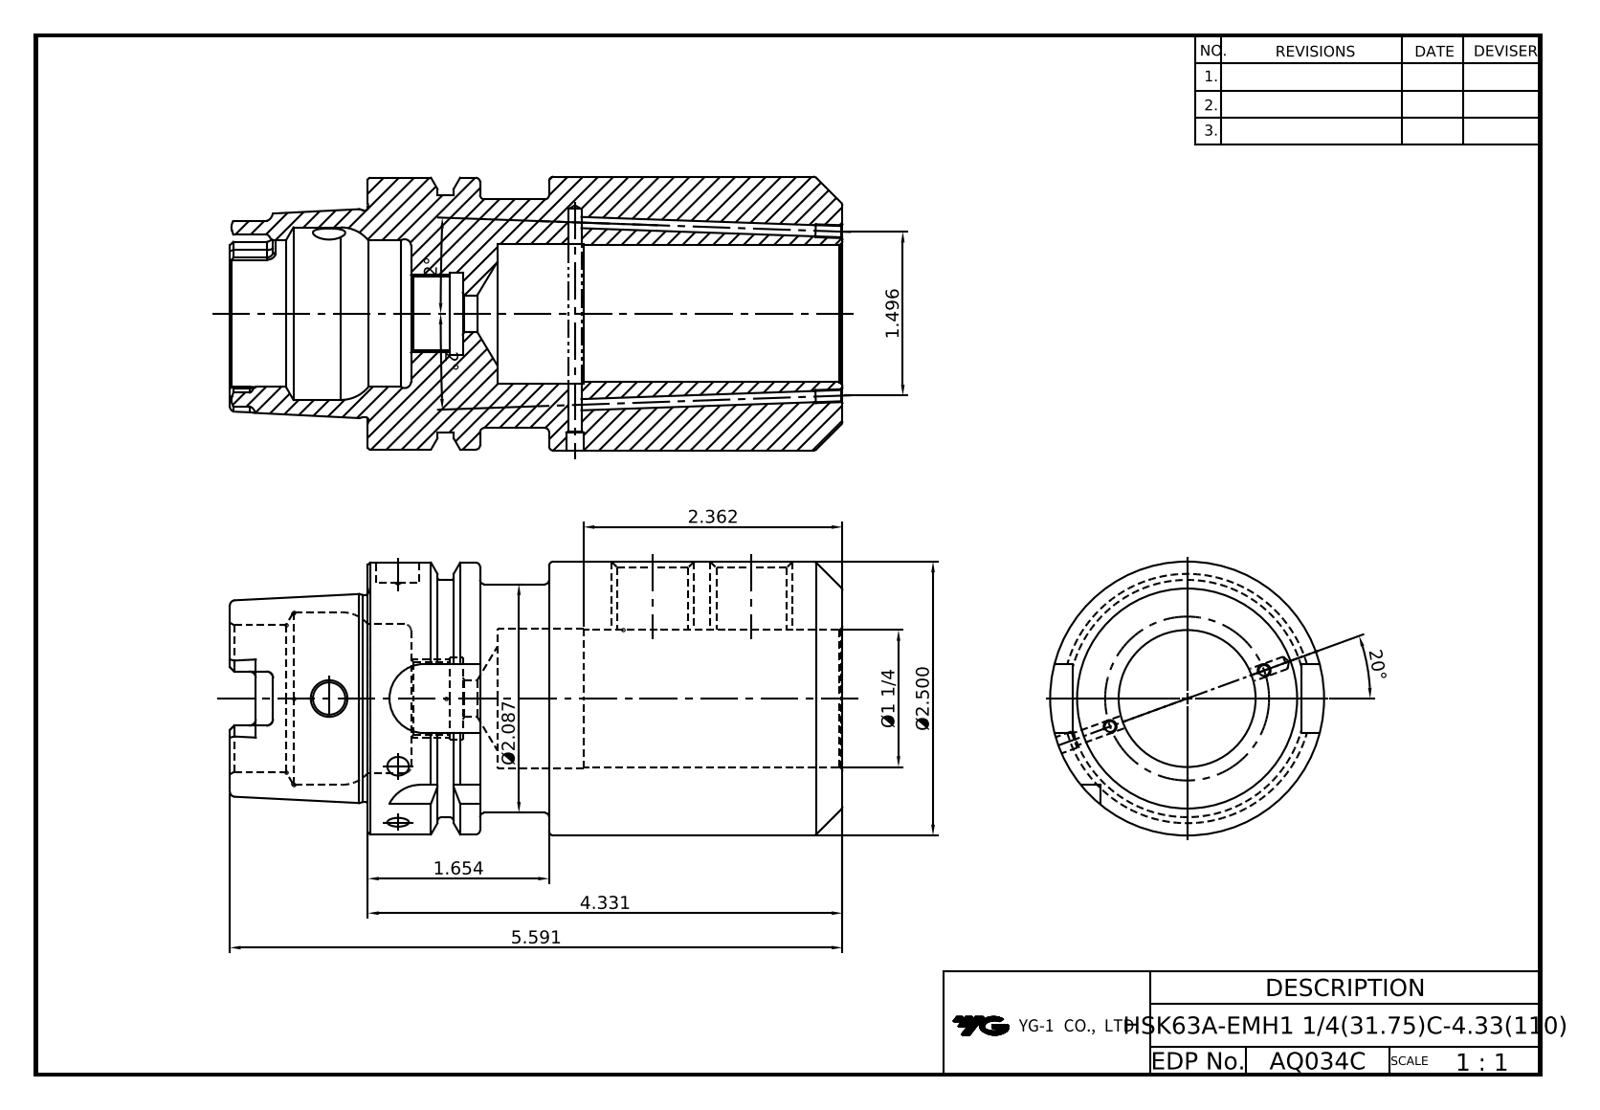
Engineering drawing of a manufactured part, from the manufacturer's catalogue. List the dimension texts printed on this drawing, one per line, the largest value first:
20°
5.591
4.331
Ø2.500
2.362
Ø2.087
2°
2°
1.654
1.496
Ø1 1/4
